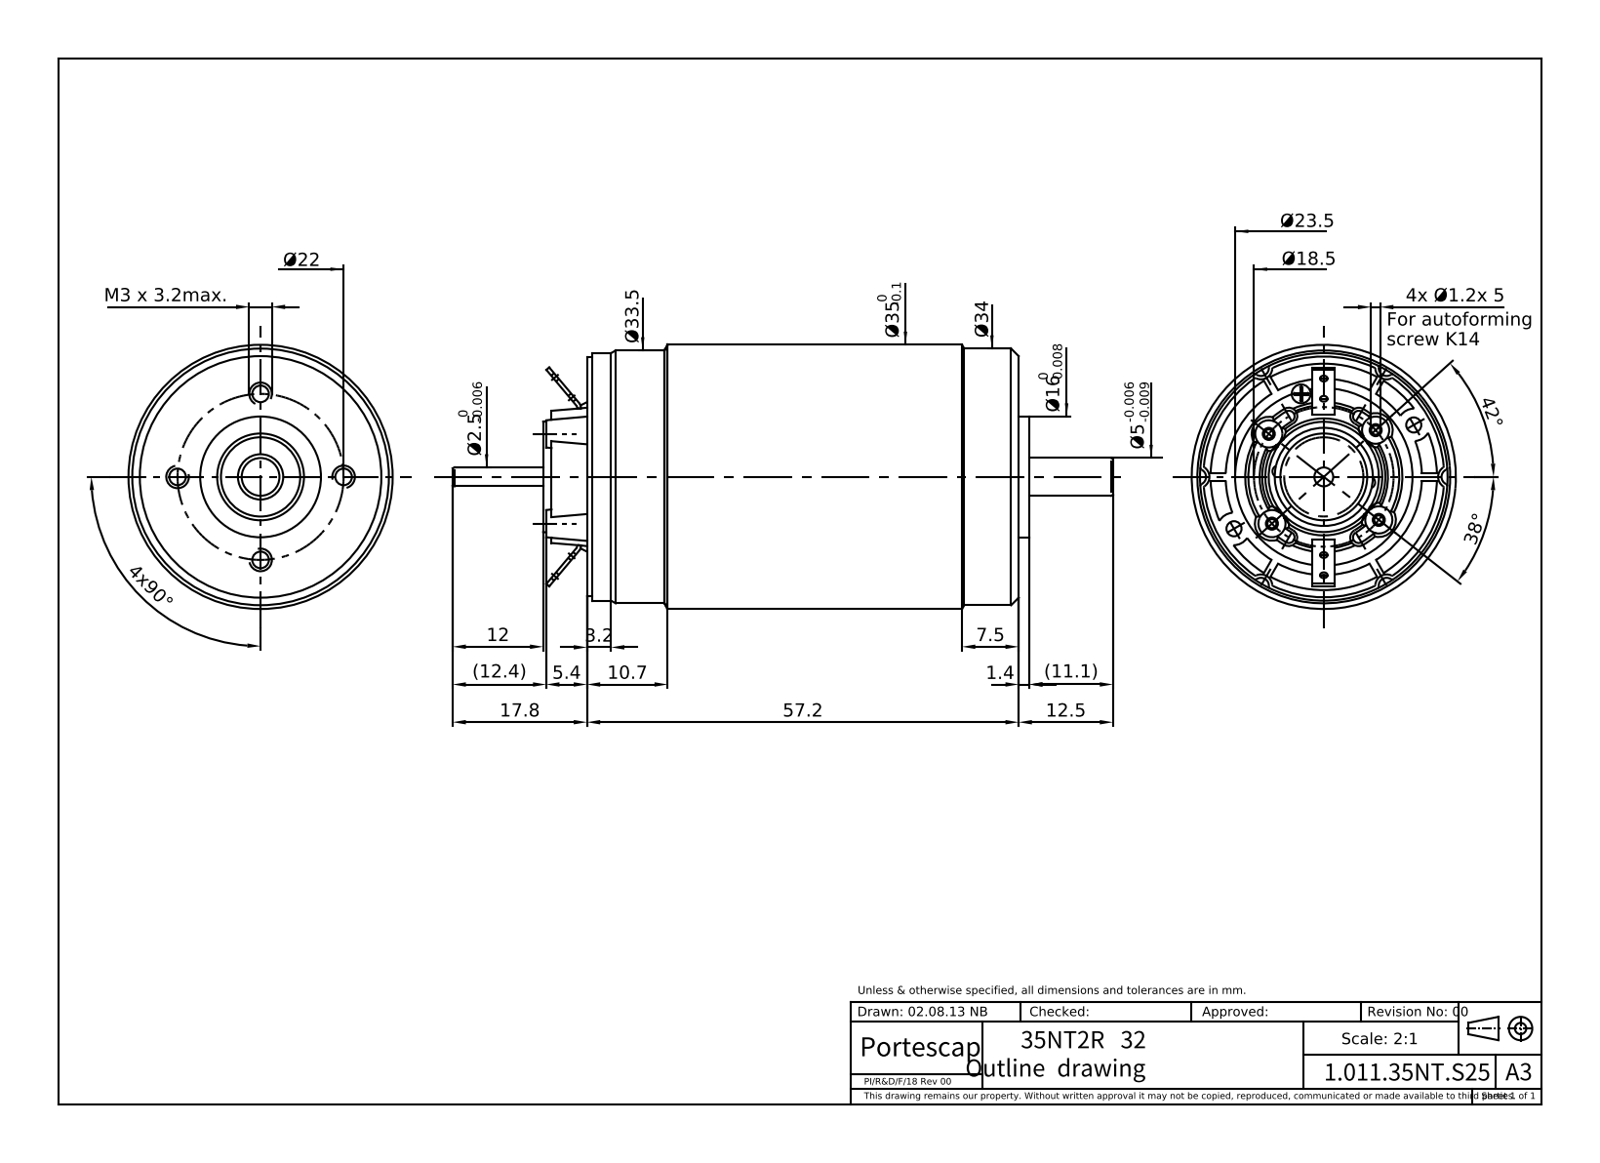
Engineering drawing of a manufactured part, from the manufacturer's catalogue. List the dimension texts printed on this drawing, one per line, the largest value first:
4x90°
57.2
42°
38°
17.8
12.5
(12.4)
12
(11.1)
10.7
7.5
5.4
3.2
M3 x 3.2max.
1.4
4x Ø1.2x 5
